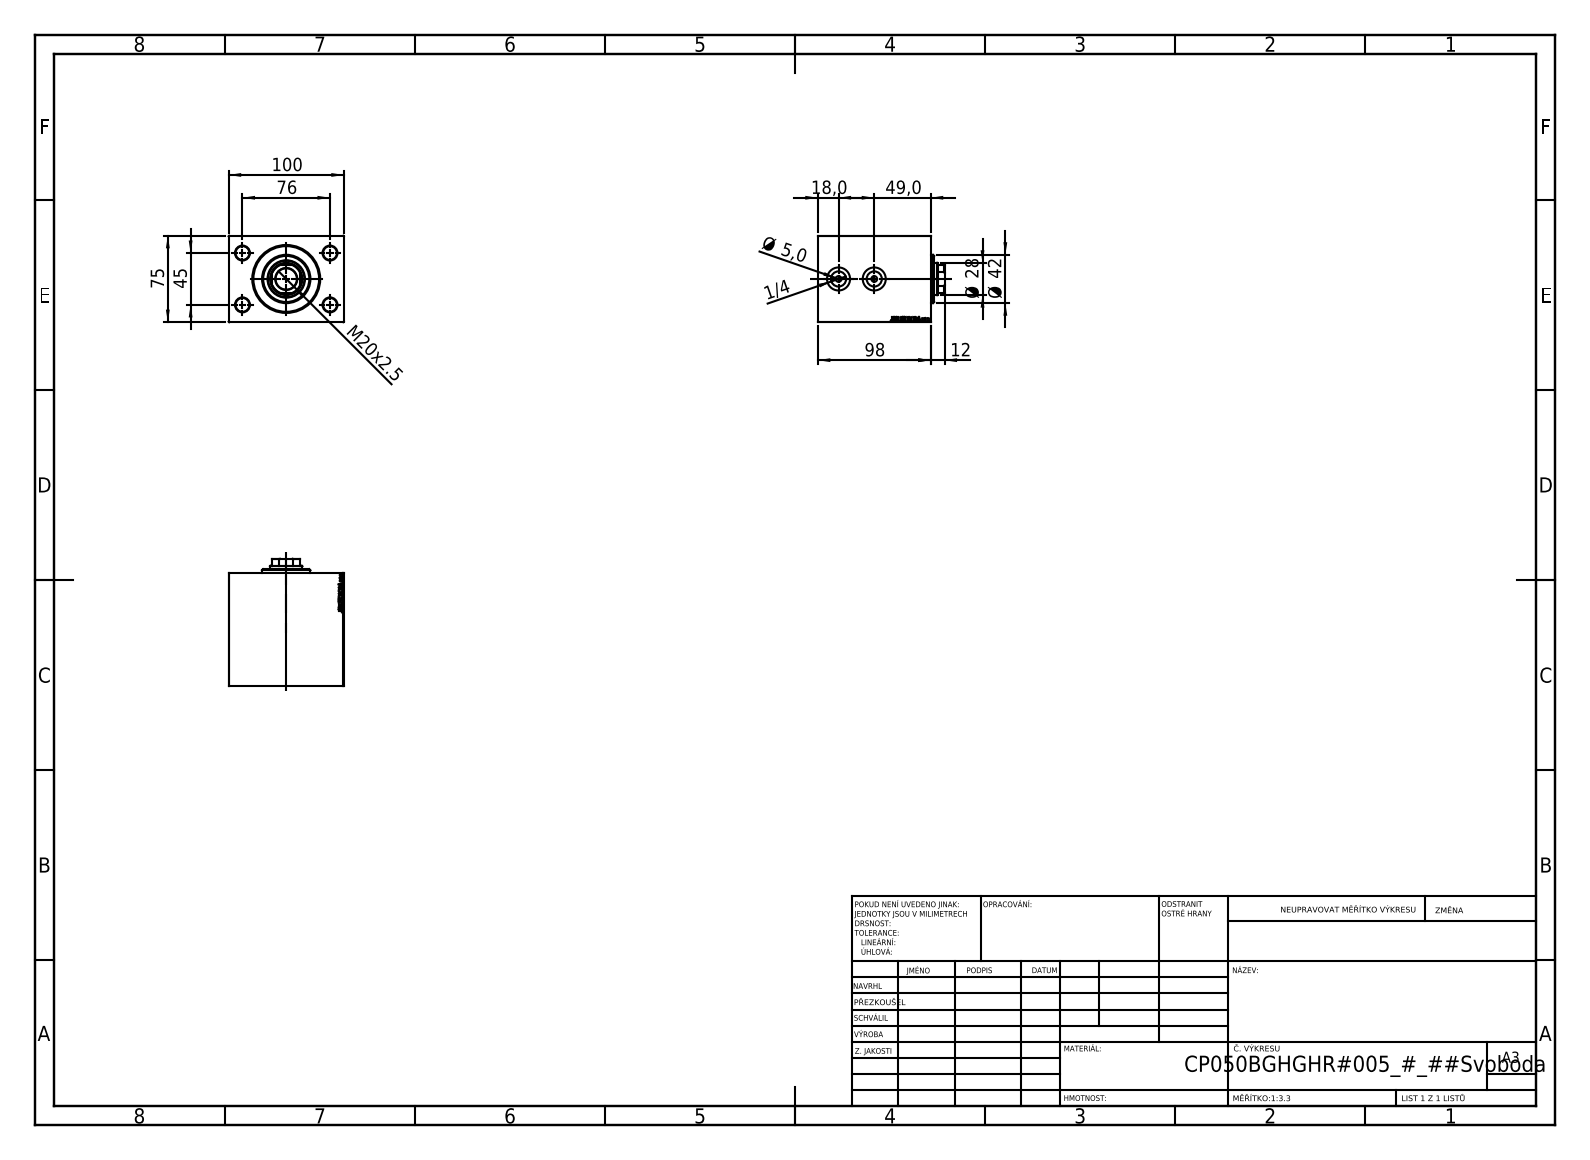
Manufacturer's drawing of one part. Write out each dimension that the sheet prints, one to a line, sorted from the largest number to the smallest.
100
98
76
75
49,0
45
Ø 42
Ø 28
M20x2.5
18,0
12
Ø 5,0
1/4
